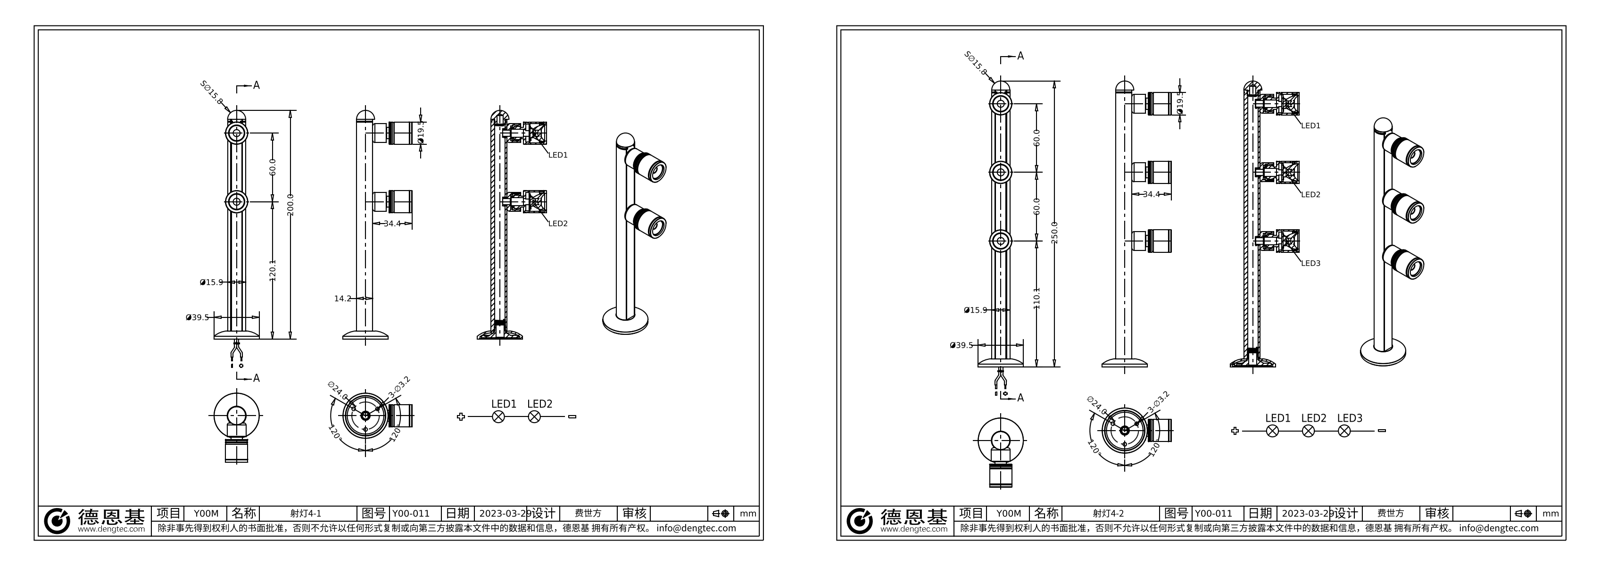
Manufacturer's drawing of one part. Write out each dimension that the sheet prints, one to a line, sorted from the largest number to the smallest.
250.0
200.0
120.1
120°
120°
120°
120°
110.1
60.0
60.0
60.0
Ø39.5
Ø39.5
34.4
34.4
∅24.0
∅24.0
Ø19.5
Ø19.5
Ø15.9
Ø15.9
S∅15.8
S∅15.8
14.2
3-∅3.2
3-∅3.2
